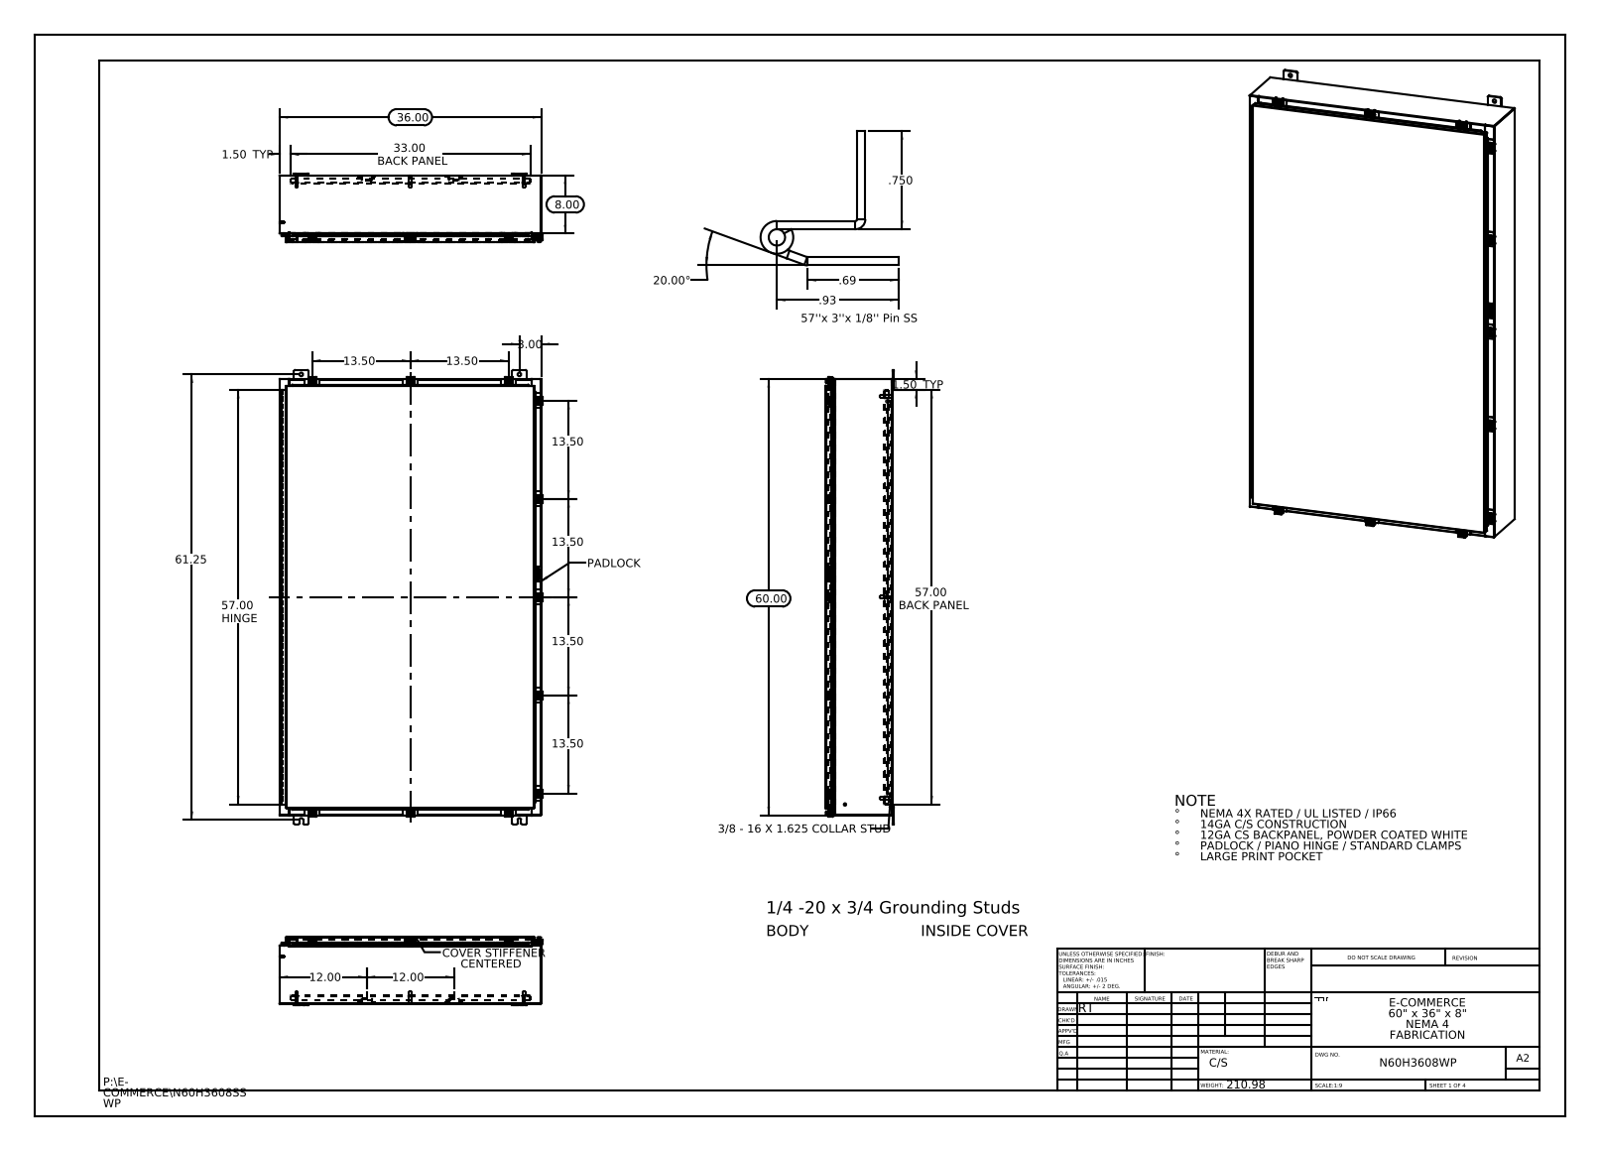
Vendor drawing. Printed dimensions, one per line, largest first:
61.25
60.00
57.00 HINGE
57.00 BACK PANEL
36.00
33.00 BACK PANEL
20.00°
13.50
13.50
13.50
13.50
13.50
13.50
12.00
12.00
8.00
3.00
1.50 TYP
1.50 TYP
.93
.750
.69
